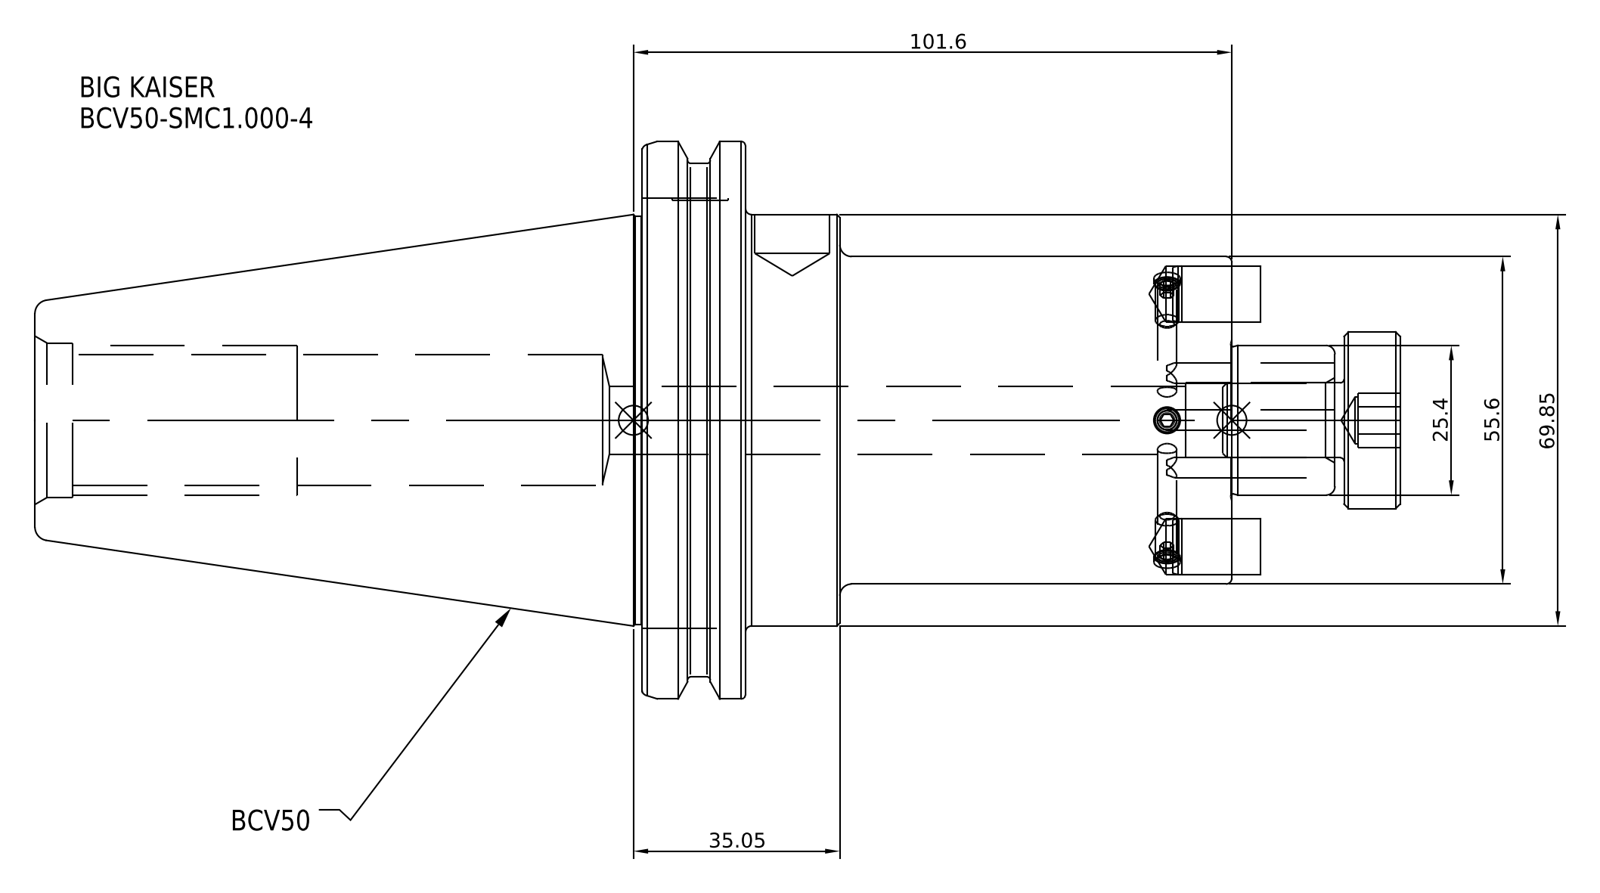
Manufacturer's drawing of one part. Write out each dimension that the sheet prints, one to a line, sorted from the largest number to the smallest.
101.6
69.85
55.6
35.05
25.4
